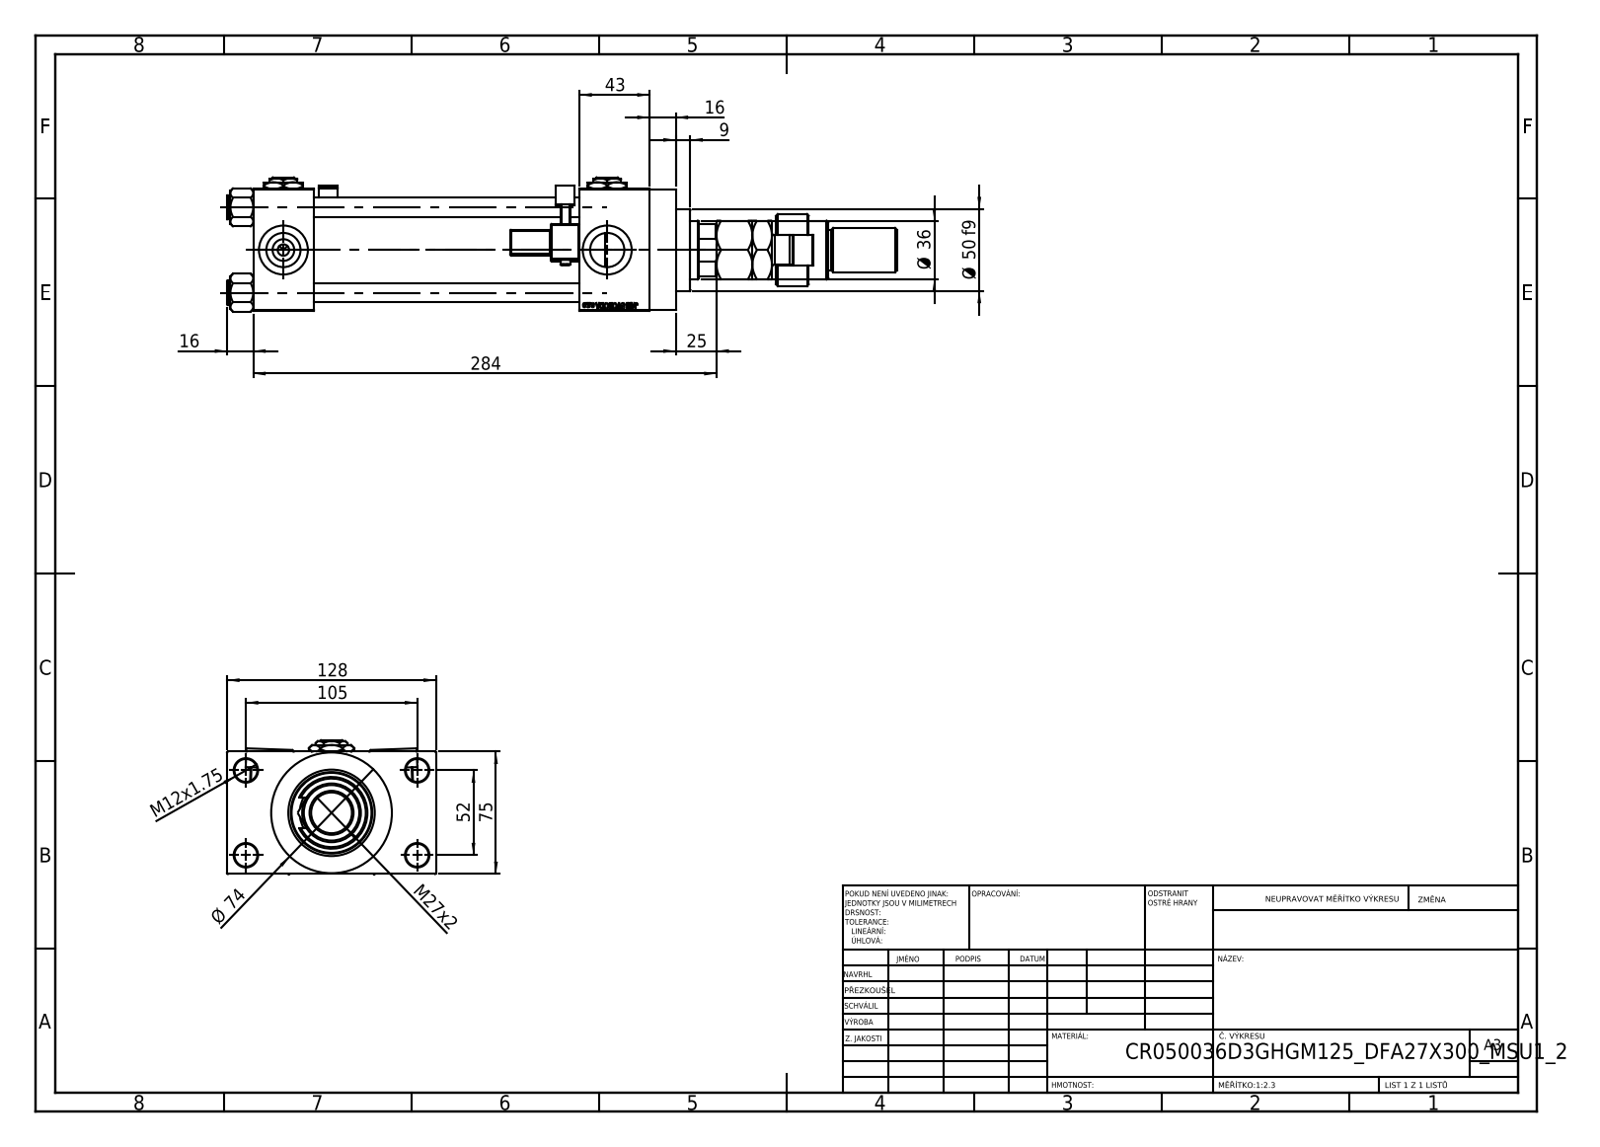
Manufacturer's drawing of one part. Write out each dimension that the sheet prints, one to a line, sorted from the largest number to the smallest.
284
128
105
75
Ø 74
52
Ø 50 f9
43
Ø 36
M27x2
25
16
16
M12x1.75
9
